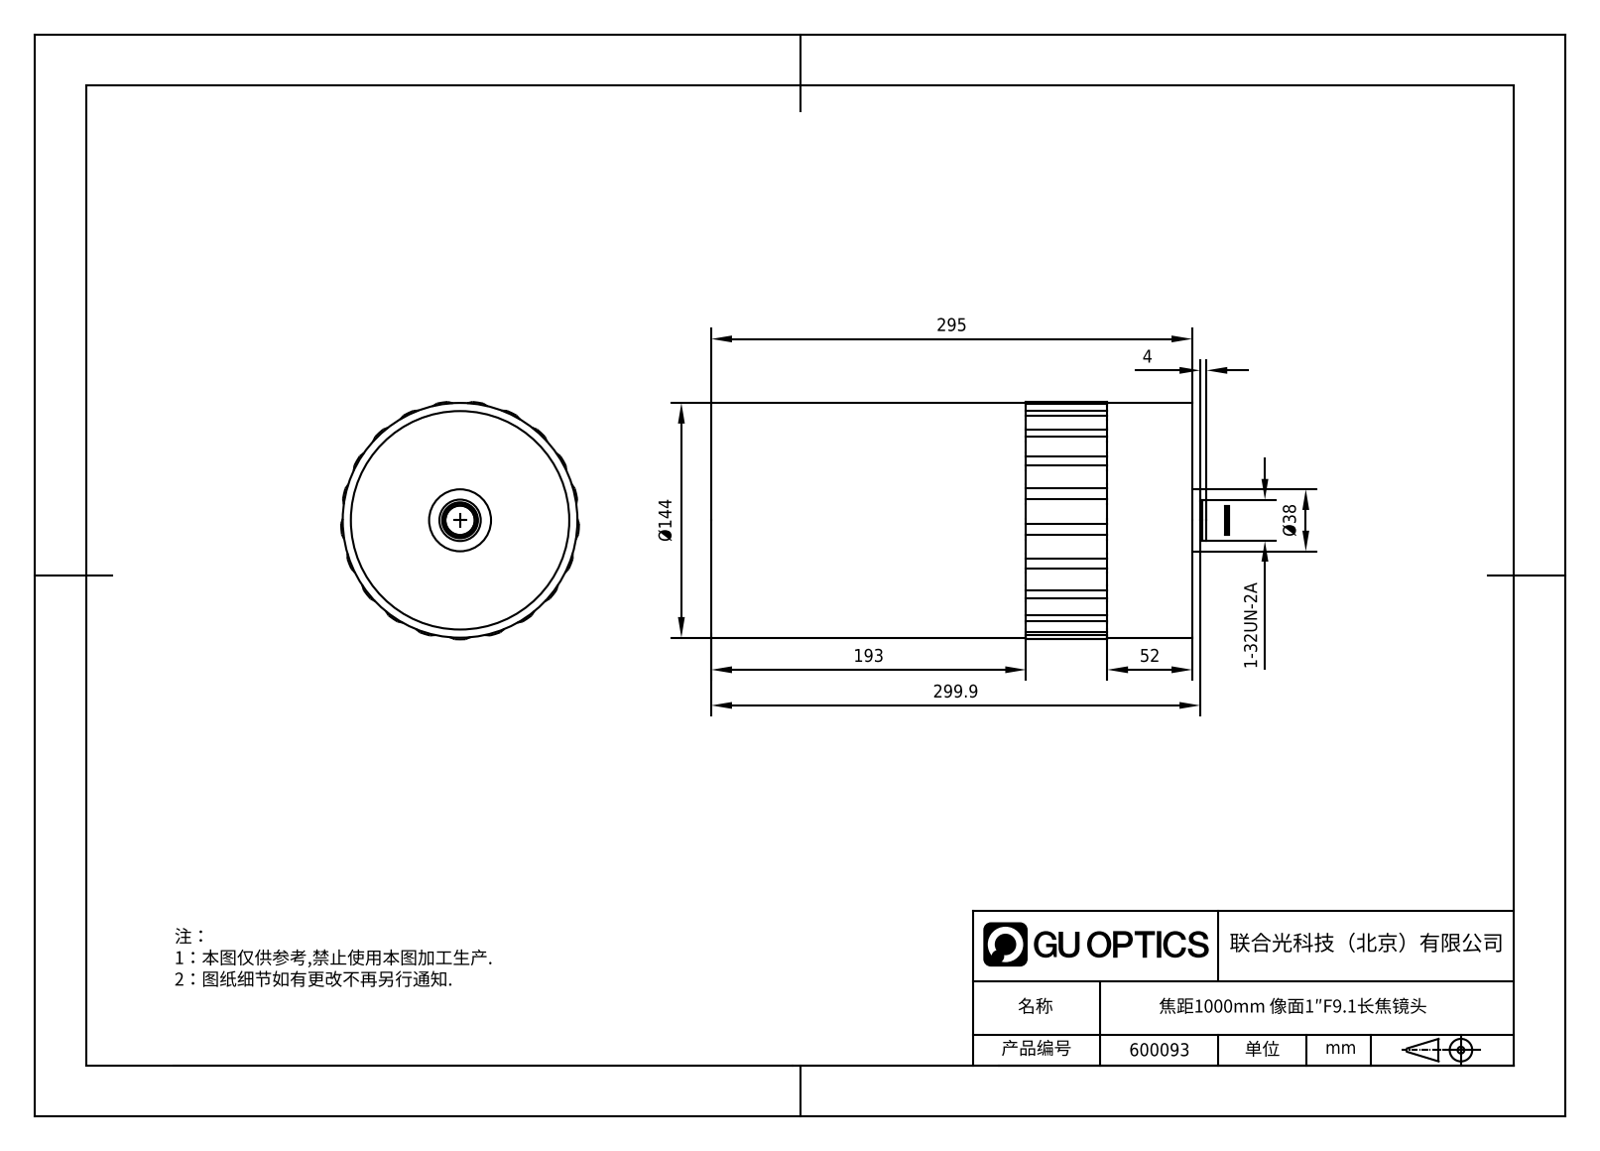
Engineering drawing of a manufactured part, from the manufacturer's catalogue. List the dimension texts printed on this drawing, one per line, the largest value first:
299.9
295
193
Ø144
52
Ø38
4
1-32UN-2A
